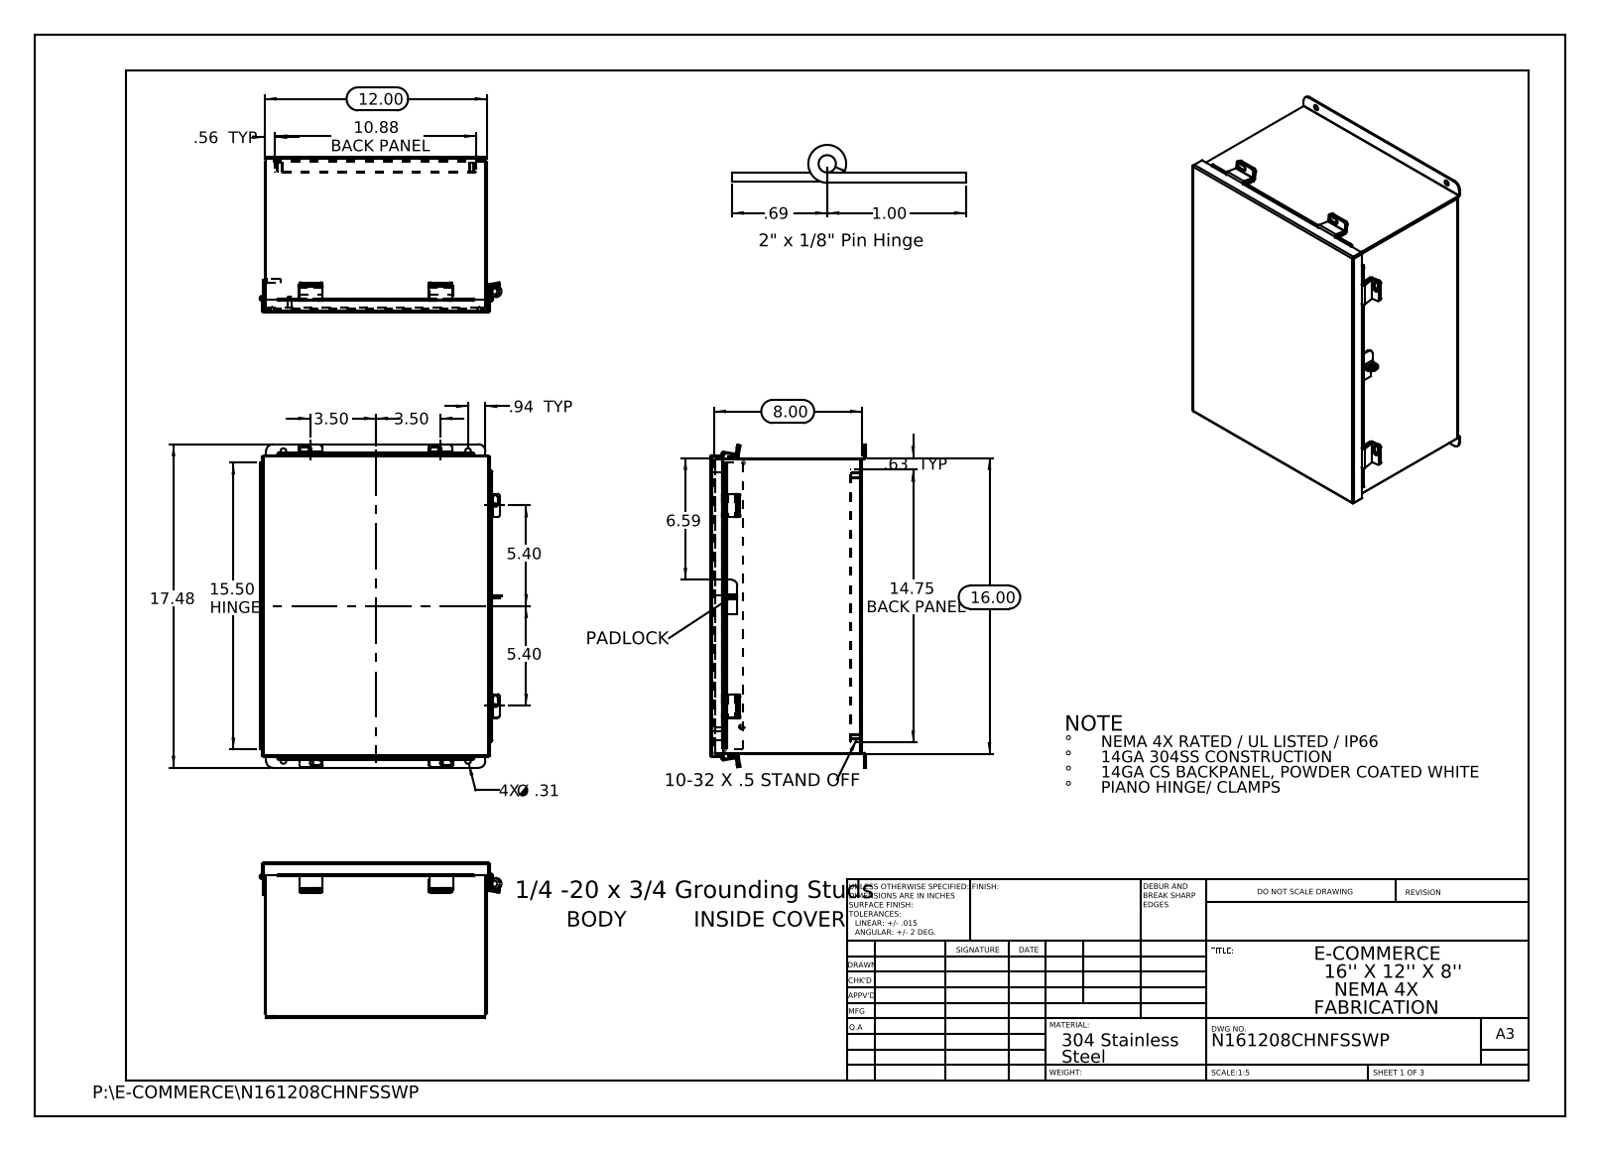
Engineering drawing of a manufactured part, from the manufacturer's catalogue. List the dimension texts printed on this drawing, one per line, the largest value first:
17.48
16.00
15.50 HINGE
14.75 BACK PANEL
12.00
10.88 BACK PANEL
8.00
6.59
5.40
5.40
3.50
3.50
1.00
.94 TYP
.69
.63 TYP
.56 TYP
4X Ø .31
